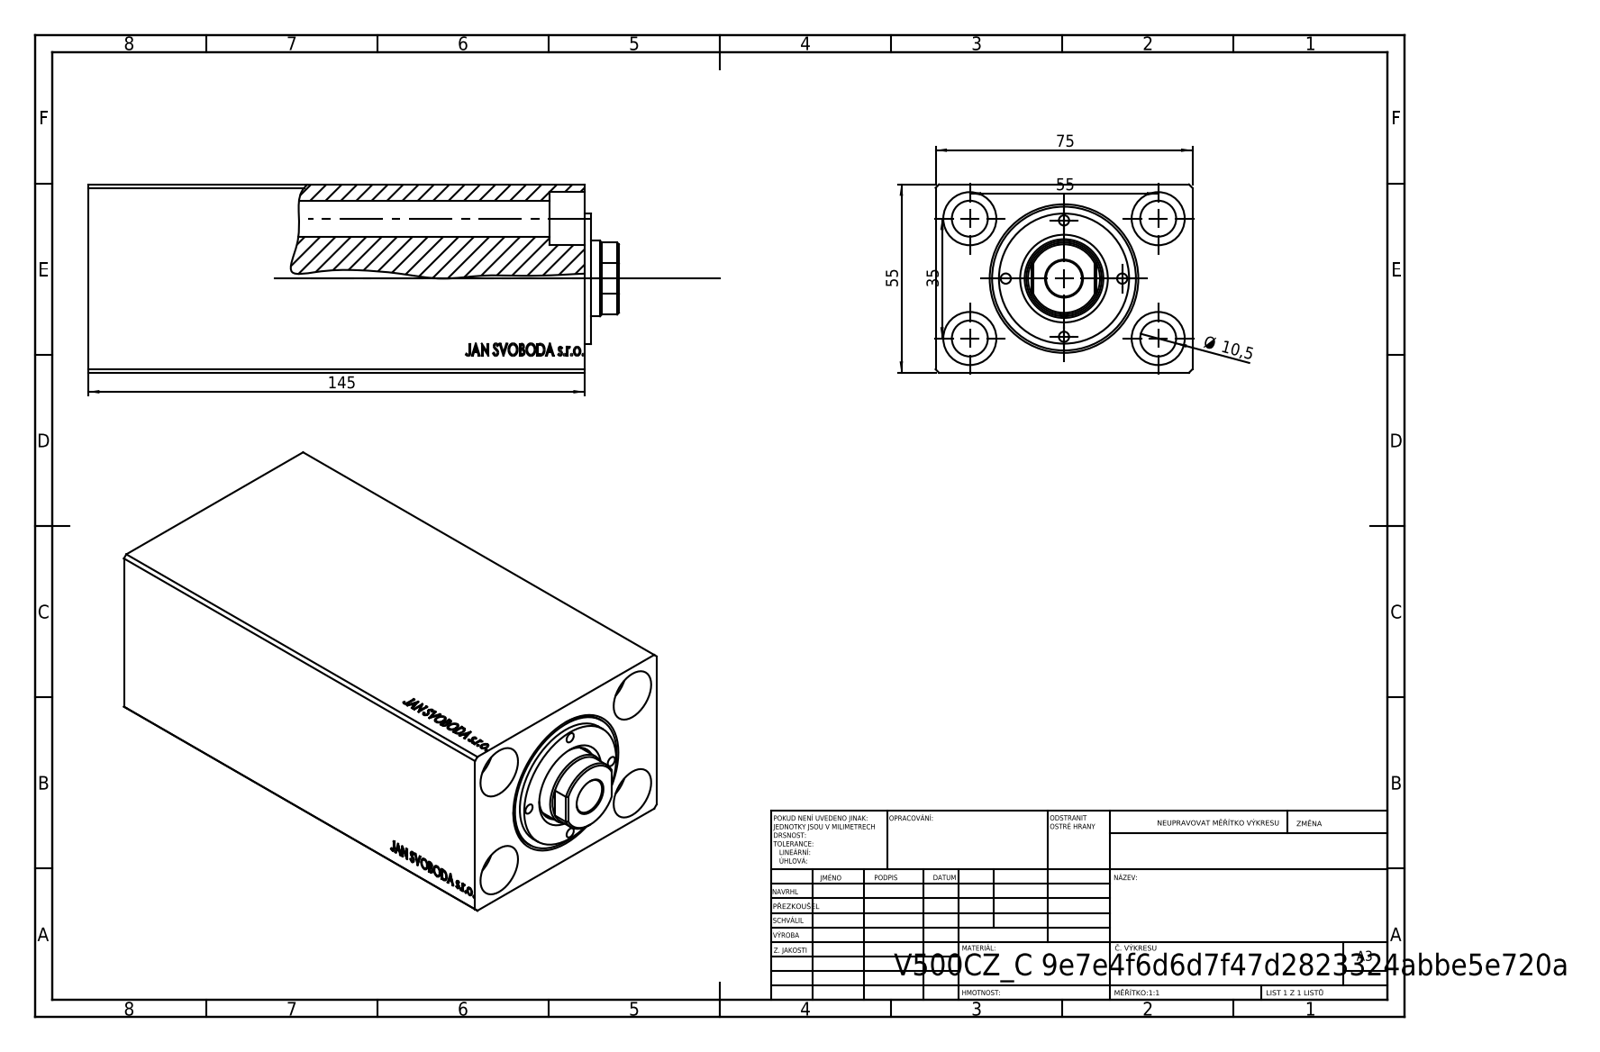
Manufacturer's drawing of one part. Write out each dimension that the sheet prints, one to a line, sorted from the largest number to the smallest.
145
75
55
55
35
Ø 10,5
